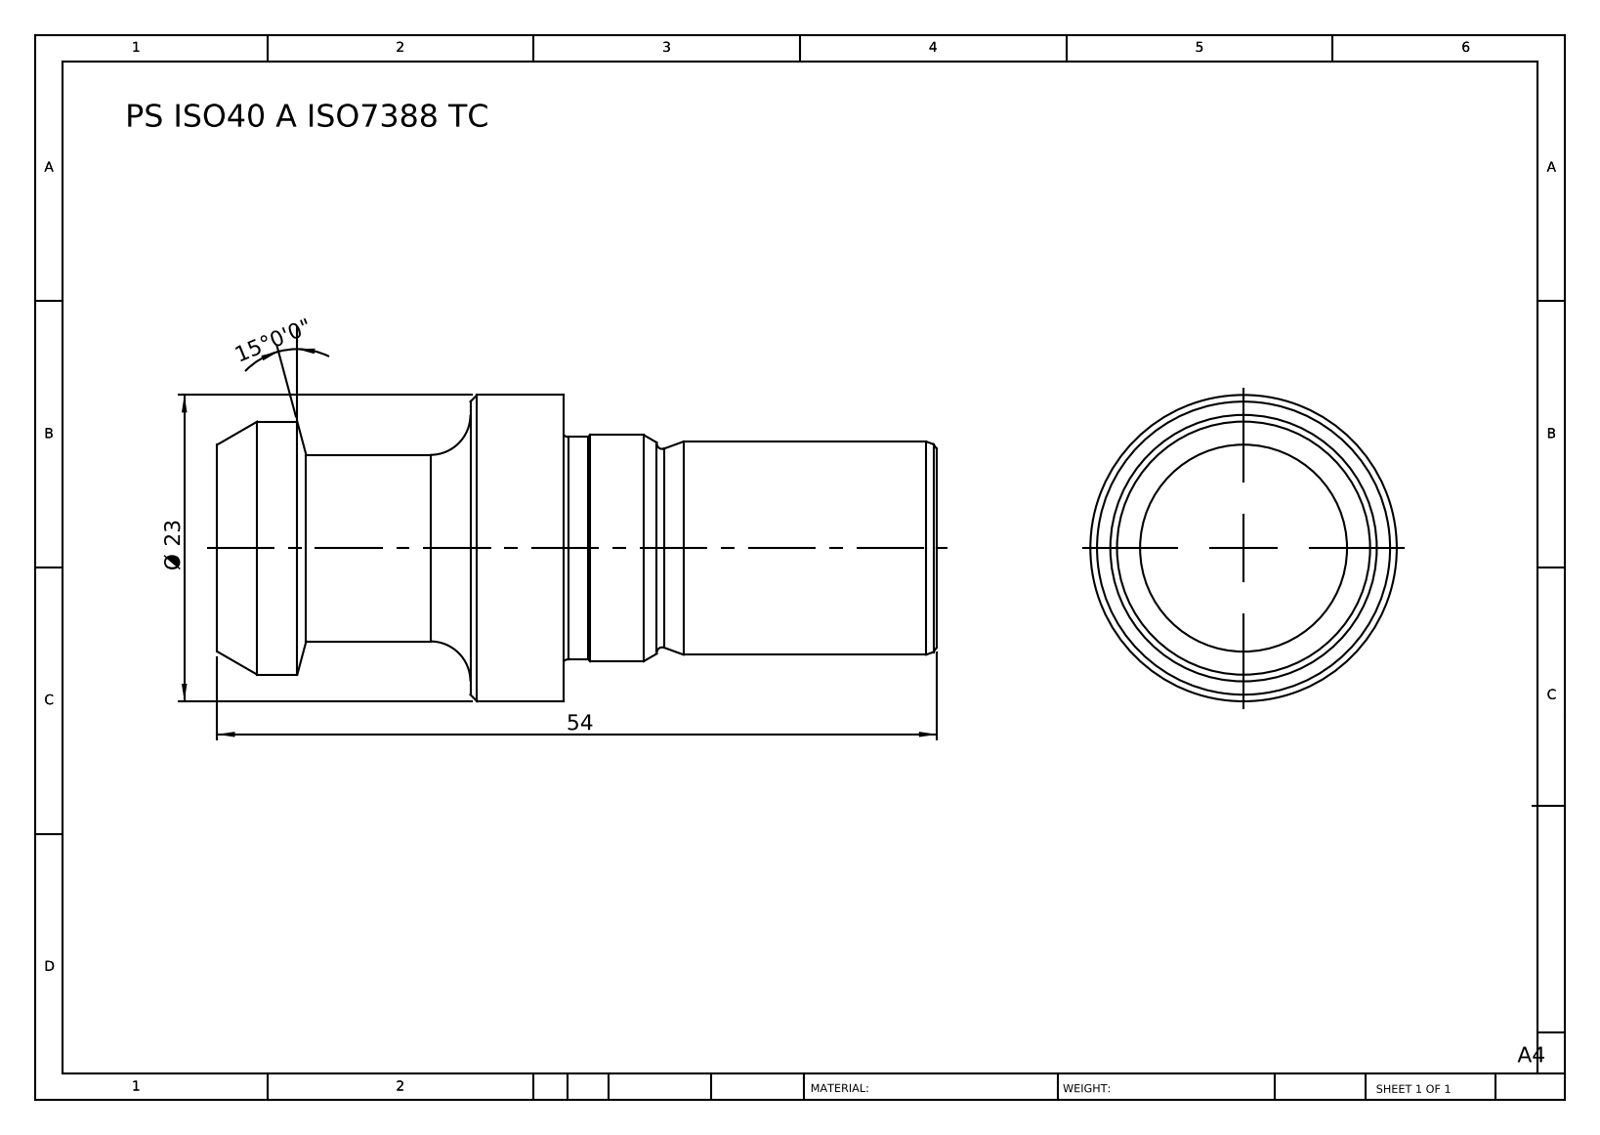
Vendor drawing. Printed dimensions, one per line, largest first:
54
Ø 23
15°0'0"
